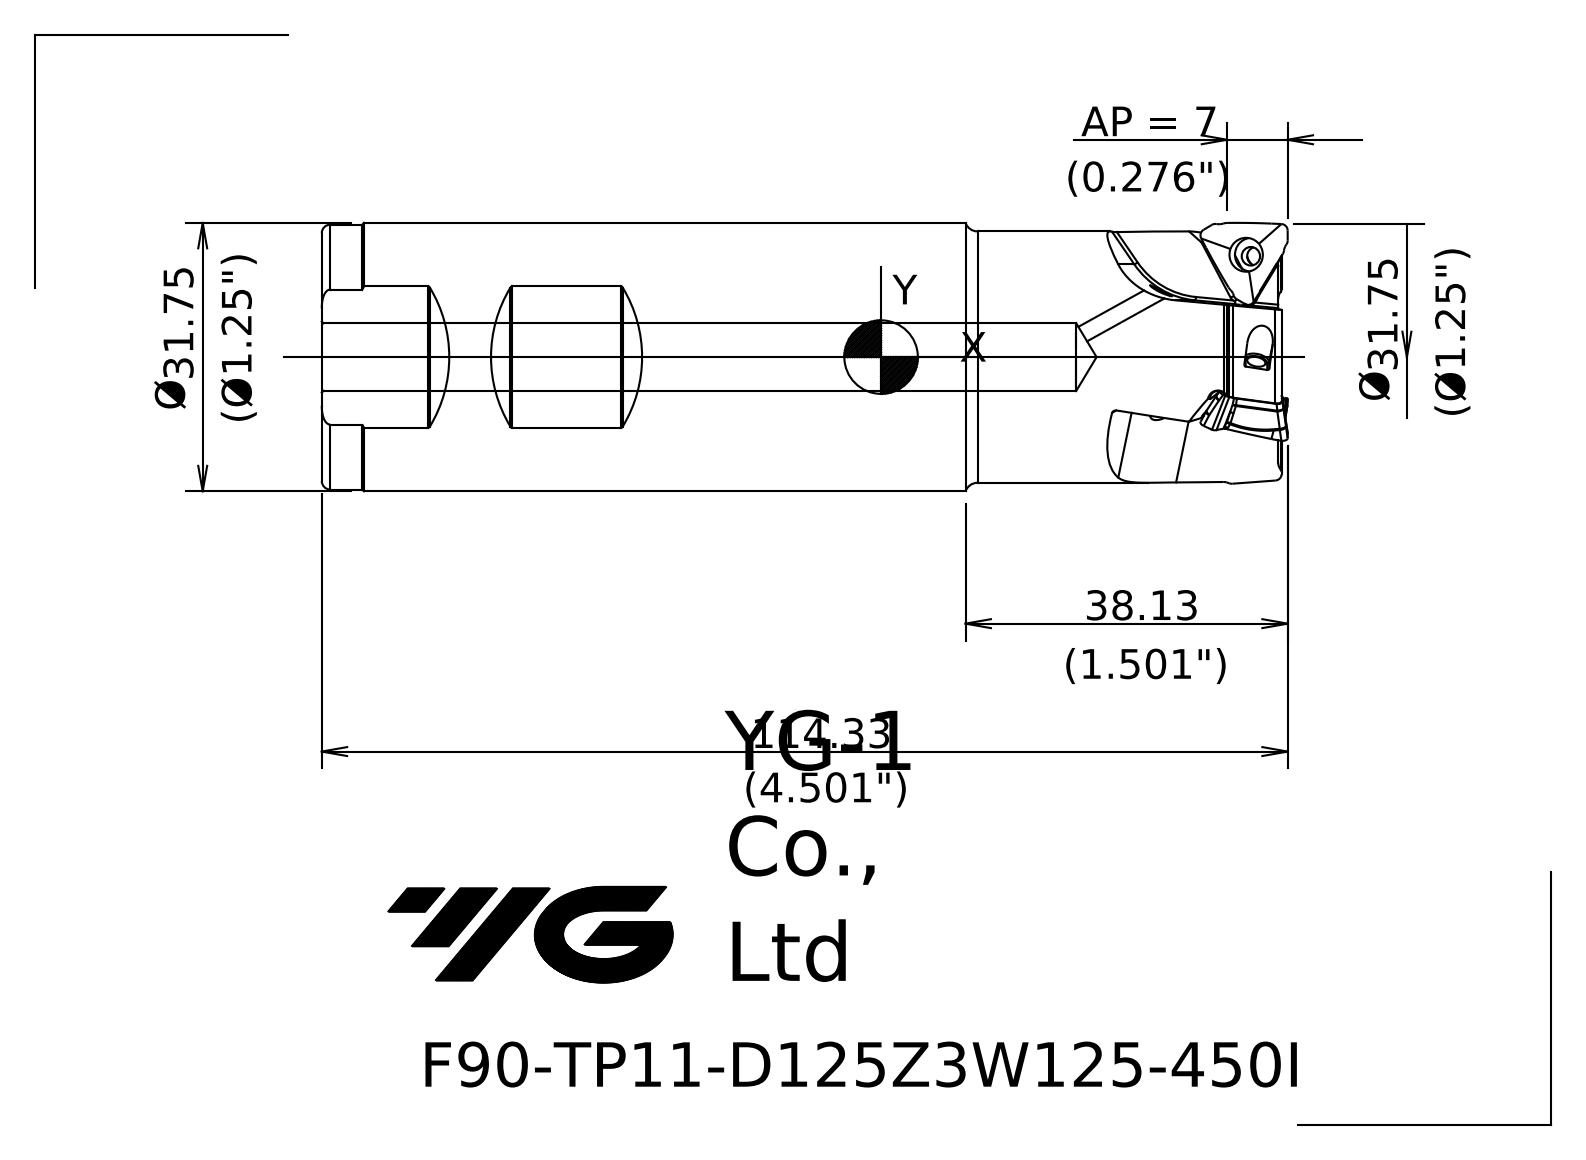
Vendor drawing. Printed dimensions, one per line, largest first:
114.33
38.13
AP = 7
